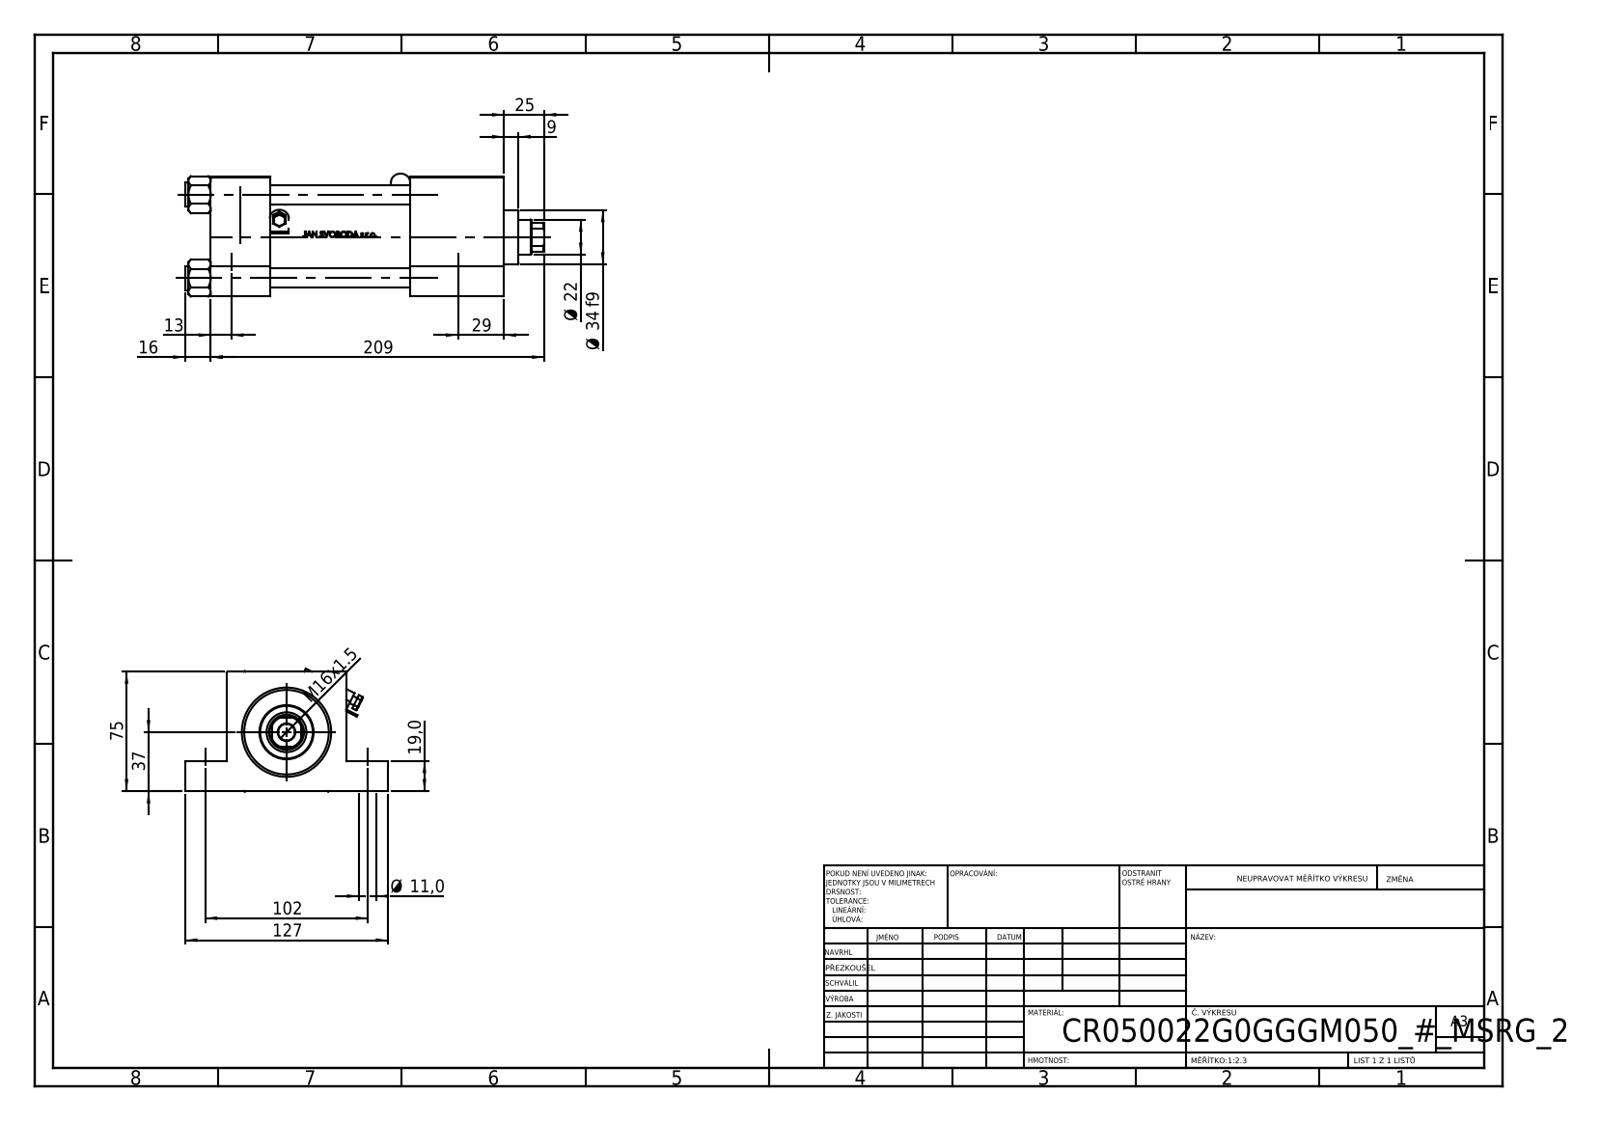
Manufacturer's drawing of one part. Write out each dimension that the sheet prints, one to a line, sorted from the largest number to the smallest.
209
127
102
75
37
Ø 34 f9
29
25
Ø 22
19,0
16
M16x1.5
13
Ø 11,0
9
